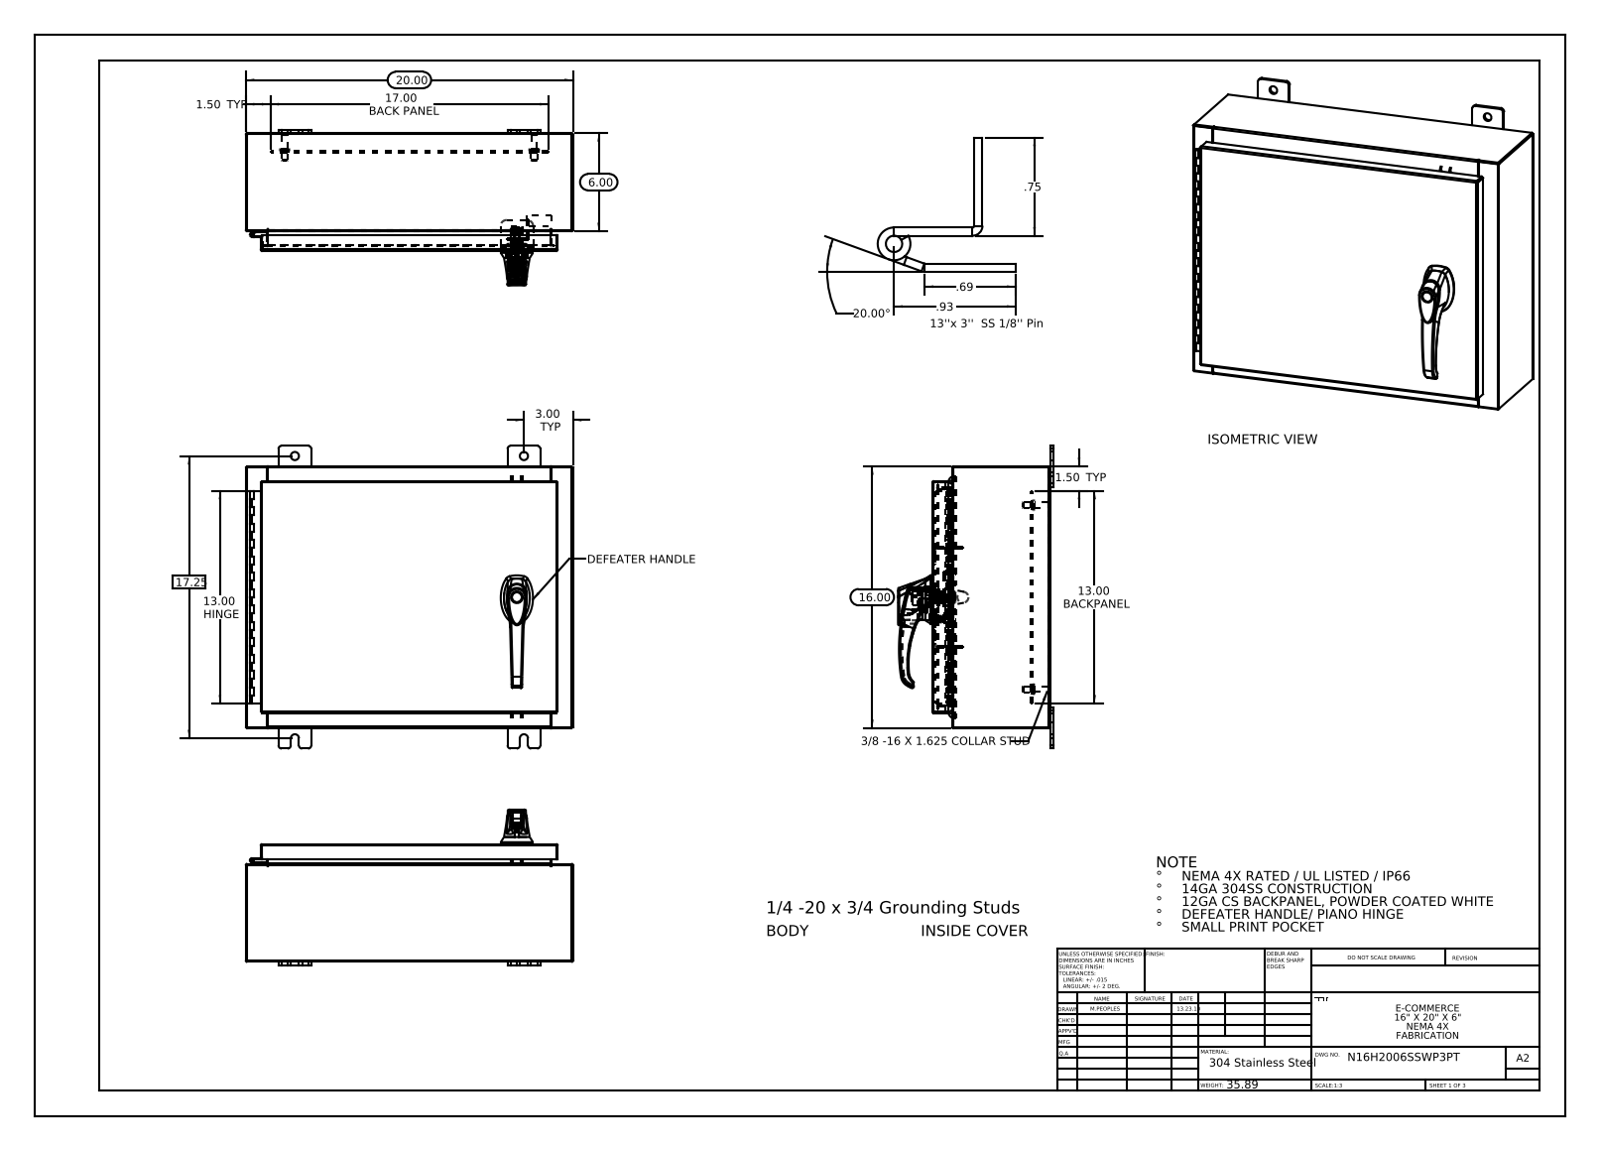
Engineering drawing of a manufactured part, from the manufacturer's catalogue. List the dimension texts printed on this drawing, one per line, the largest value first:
20.00
20.00°
17.25
17.00 BACK PANEL
16.00
13.00 HINGE
13.00 BACKPANEL
6.00
3.00 TYP
1.50 TYP
1.50 TYP
.93
.75
.69
